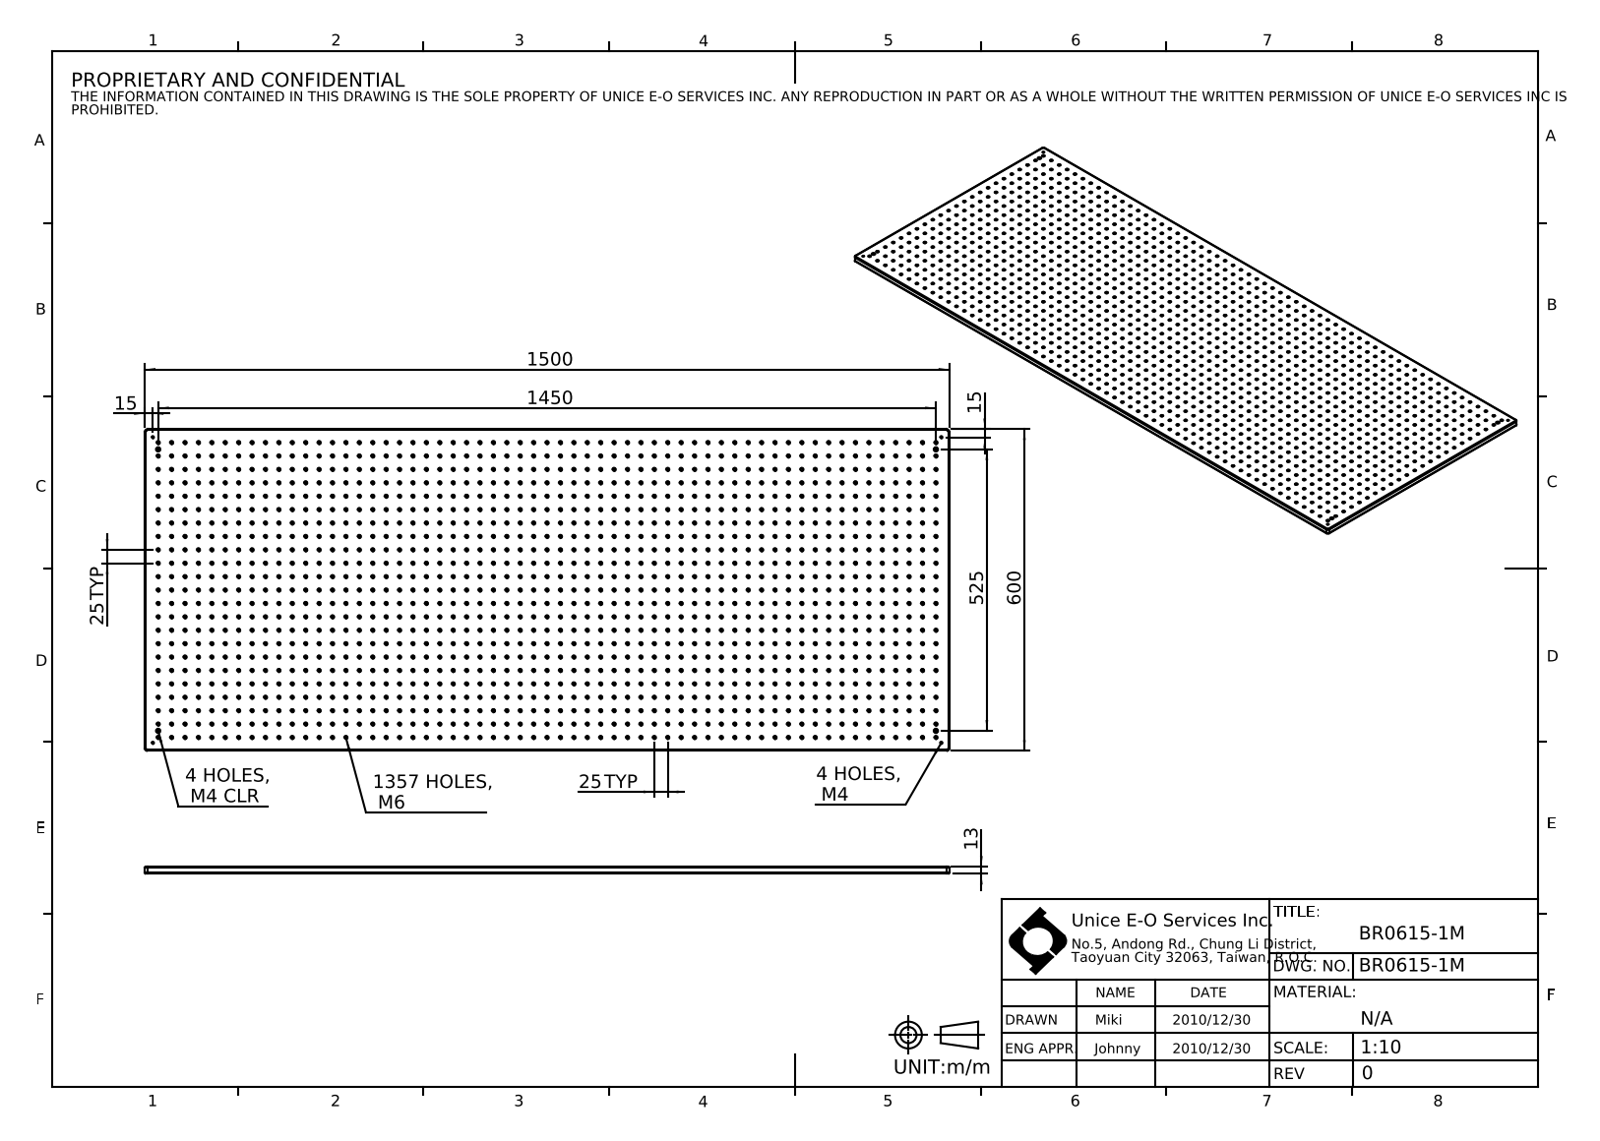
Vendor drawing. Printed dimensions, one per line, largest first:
1500
1450
1357 HOLES, M6
600
525
25 TYP
25 TYP
15
15
13
4 HOLES, M4
4 HOLES, M4 CLR
